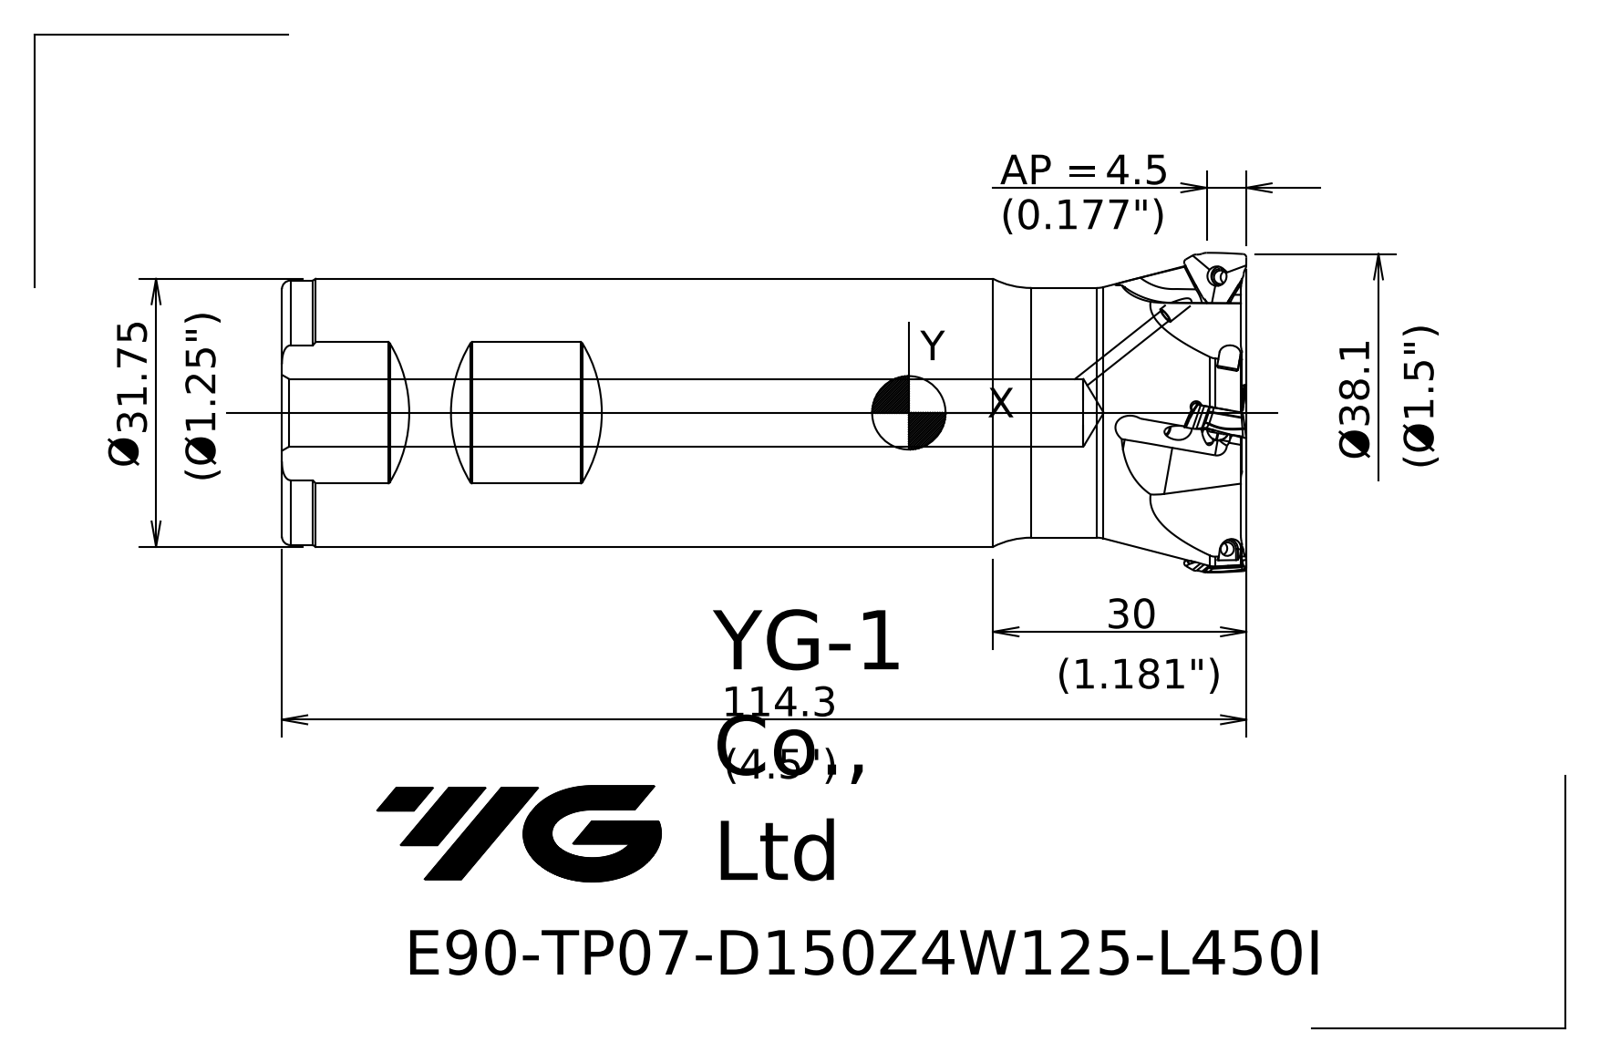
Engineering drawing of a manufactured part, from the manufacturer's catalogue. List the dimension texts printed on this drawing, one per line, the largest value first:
114.3
Ø38.1
30
4.5 AP =
